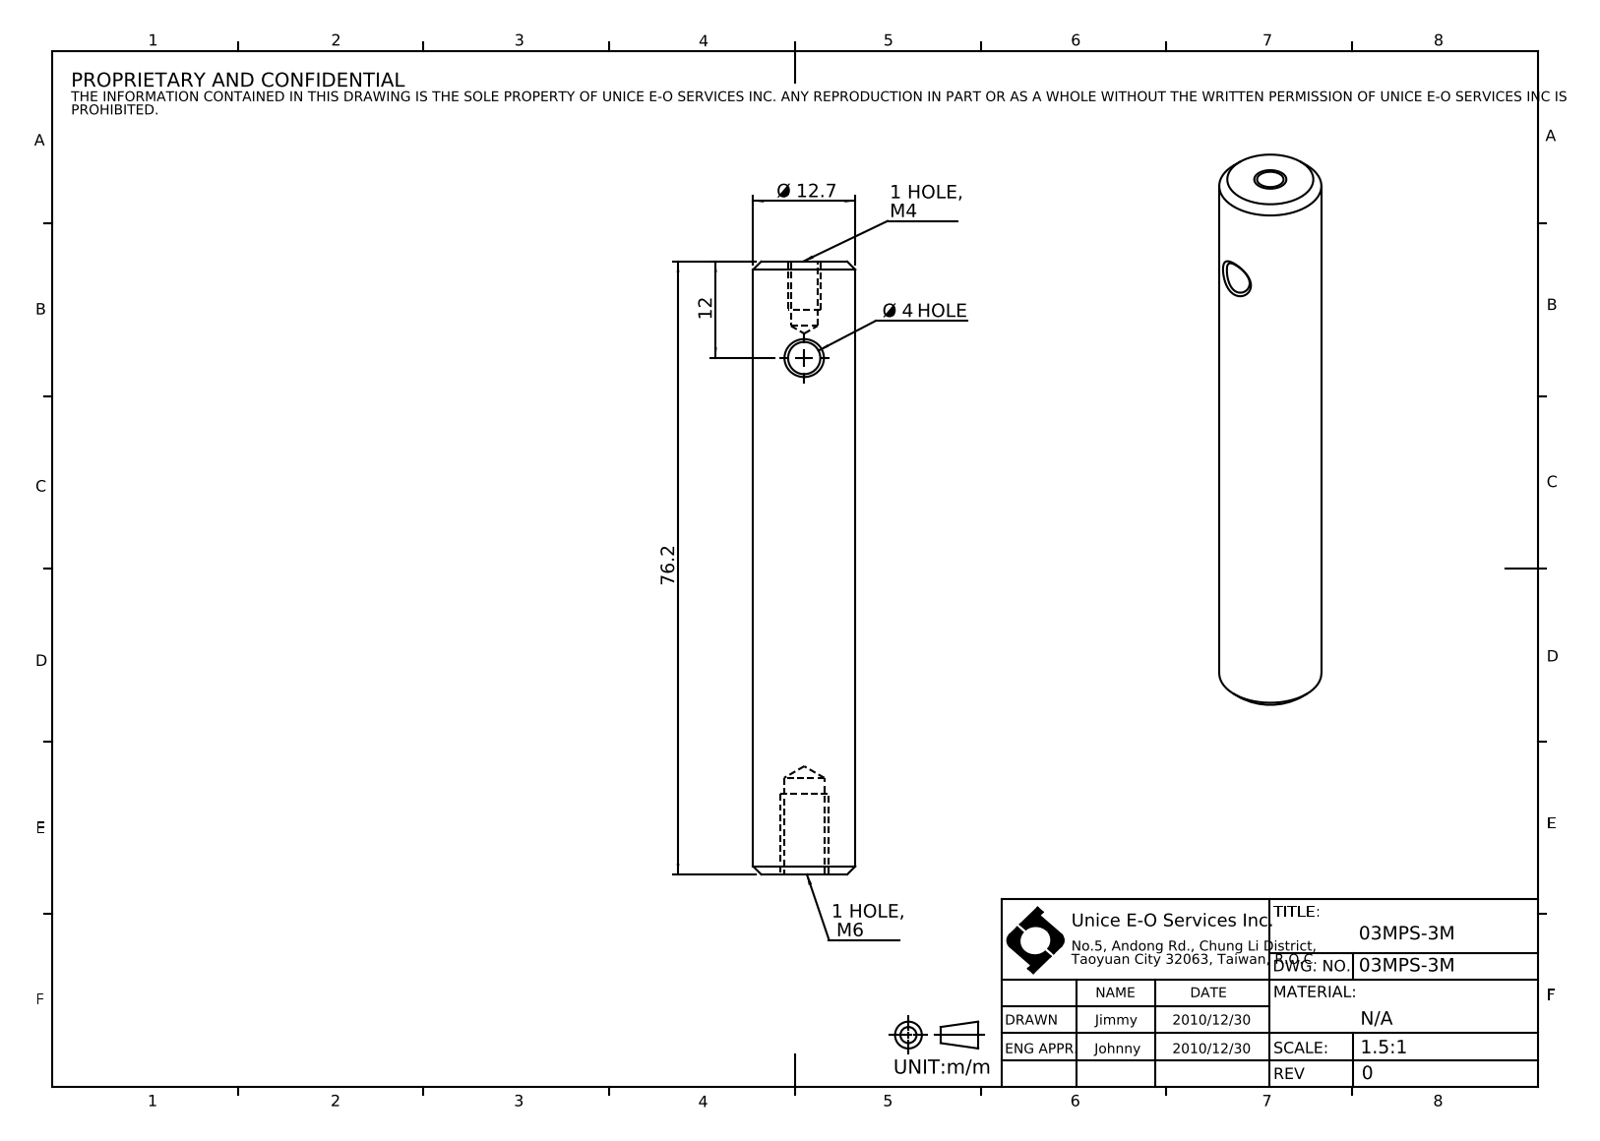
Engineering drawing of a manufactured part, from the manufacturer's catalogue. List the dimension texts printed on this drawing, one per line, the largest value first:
76.2
Ø 12.7
12
Ø 4 HOLE
